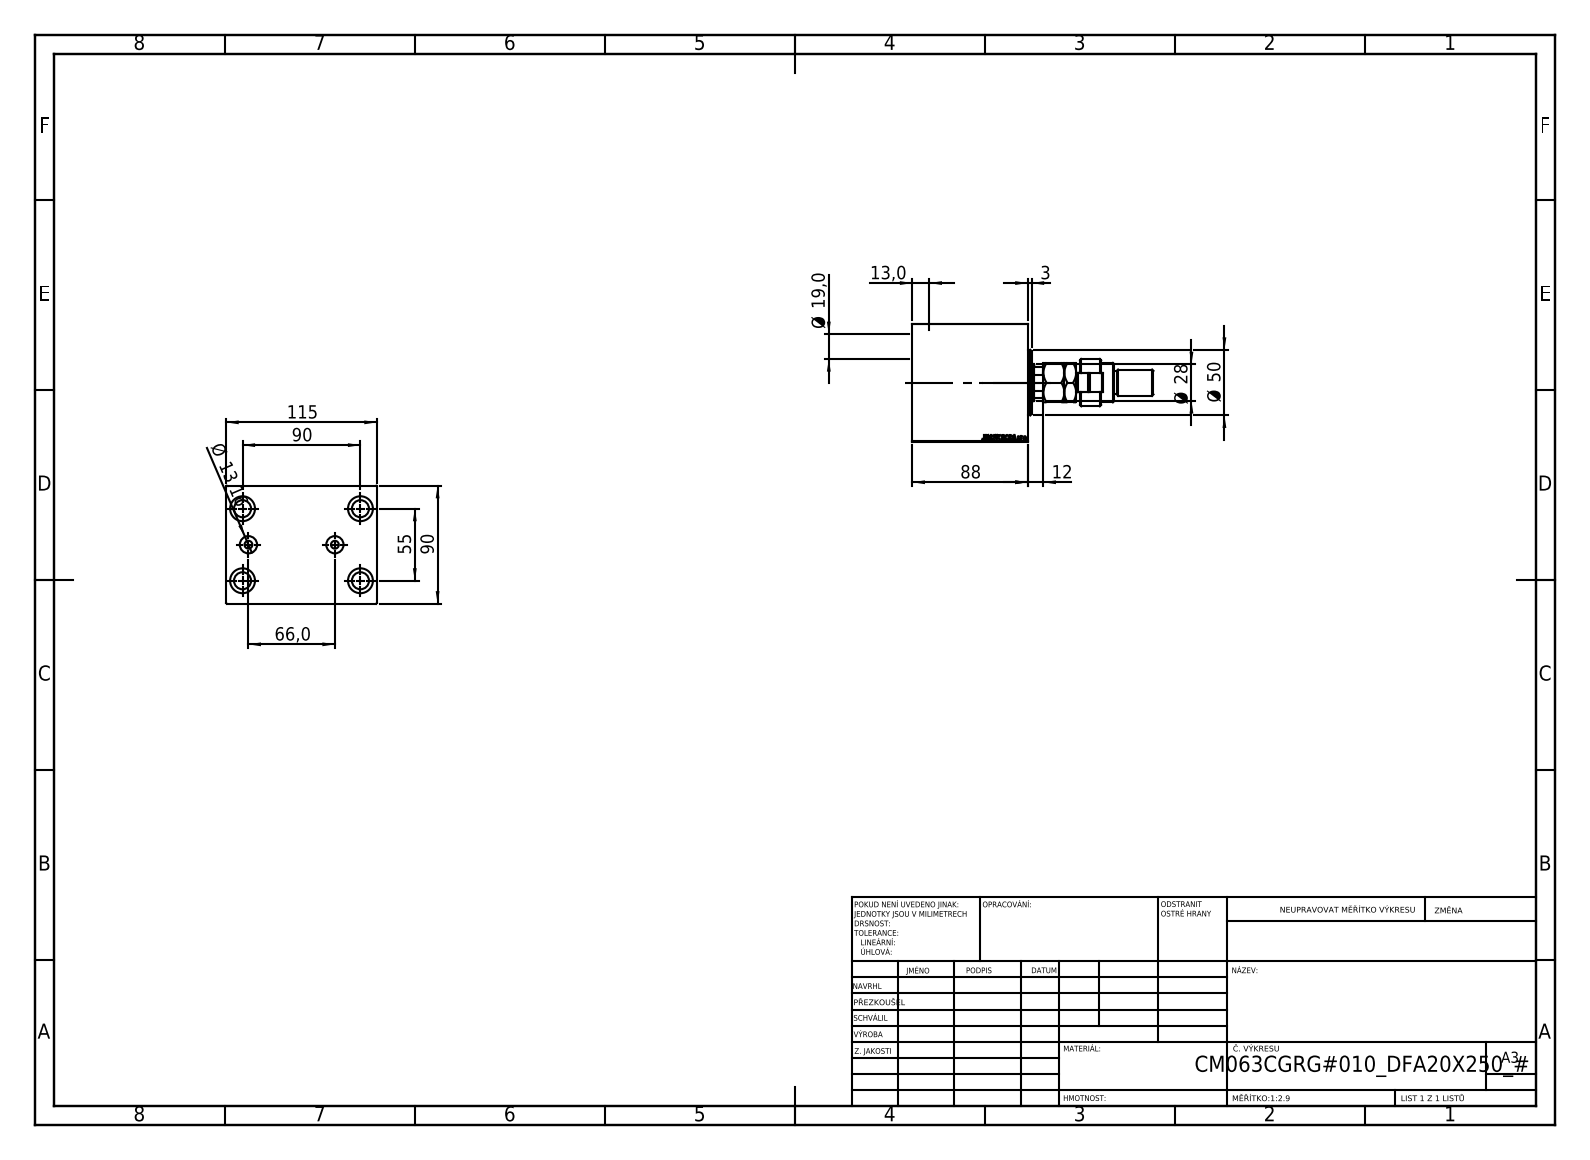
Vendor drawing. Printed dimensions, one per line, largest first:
115
90
90
88
66,0
55
Ø 50
Ø 28
Ø 19,0
Ø 13,16
13,0
12
3
